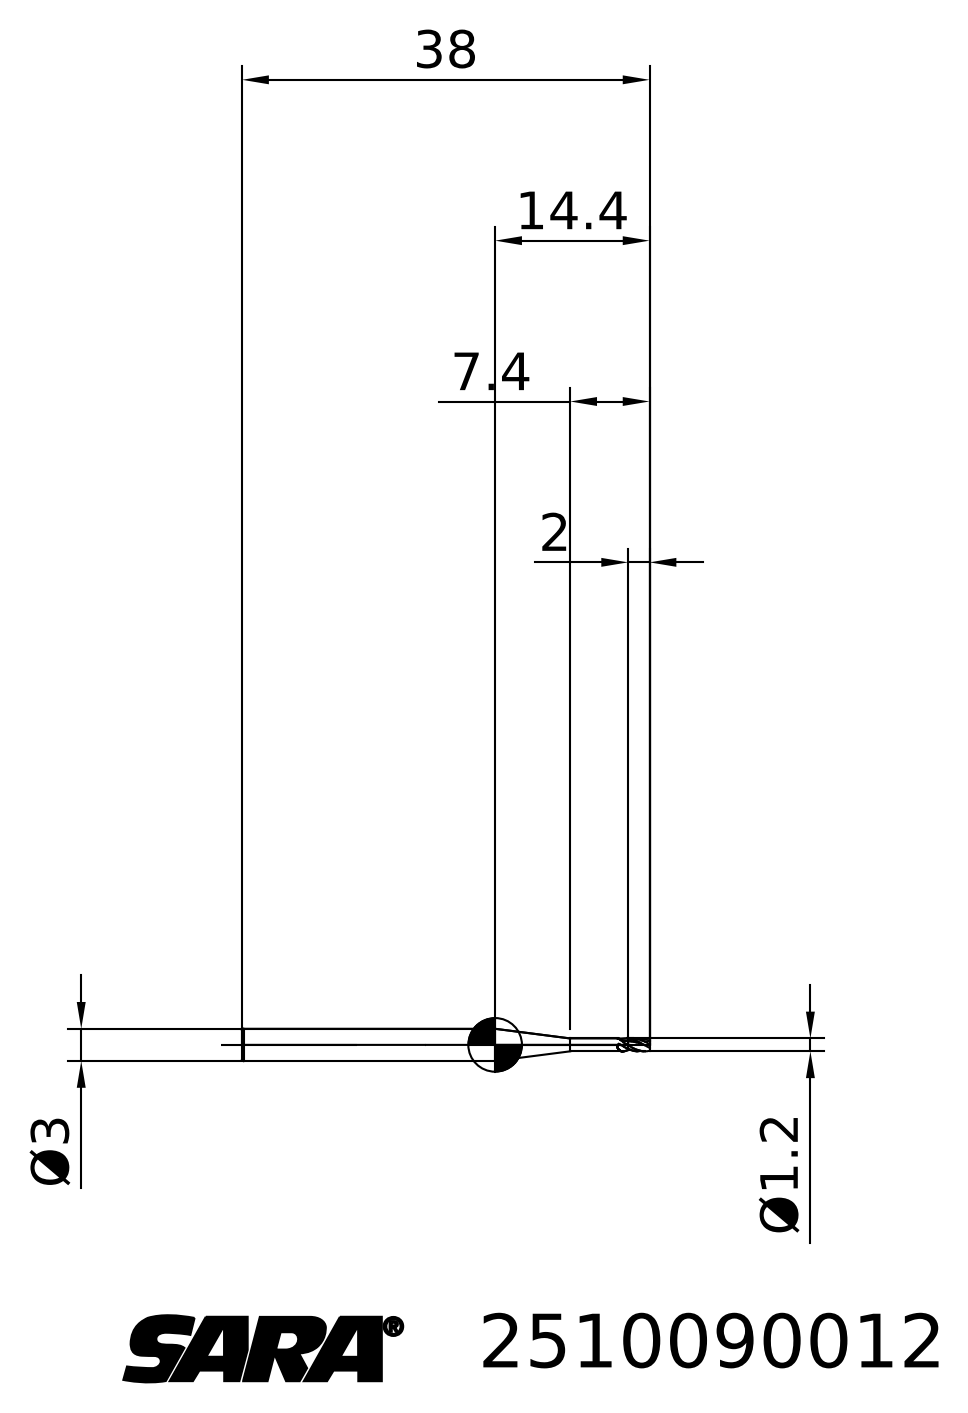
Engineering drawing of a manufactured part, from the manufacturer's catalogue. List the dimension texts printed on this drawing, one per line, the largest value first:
38
14.4
7.4
Ø3
2
Ø1.2
